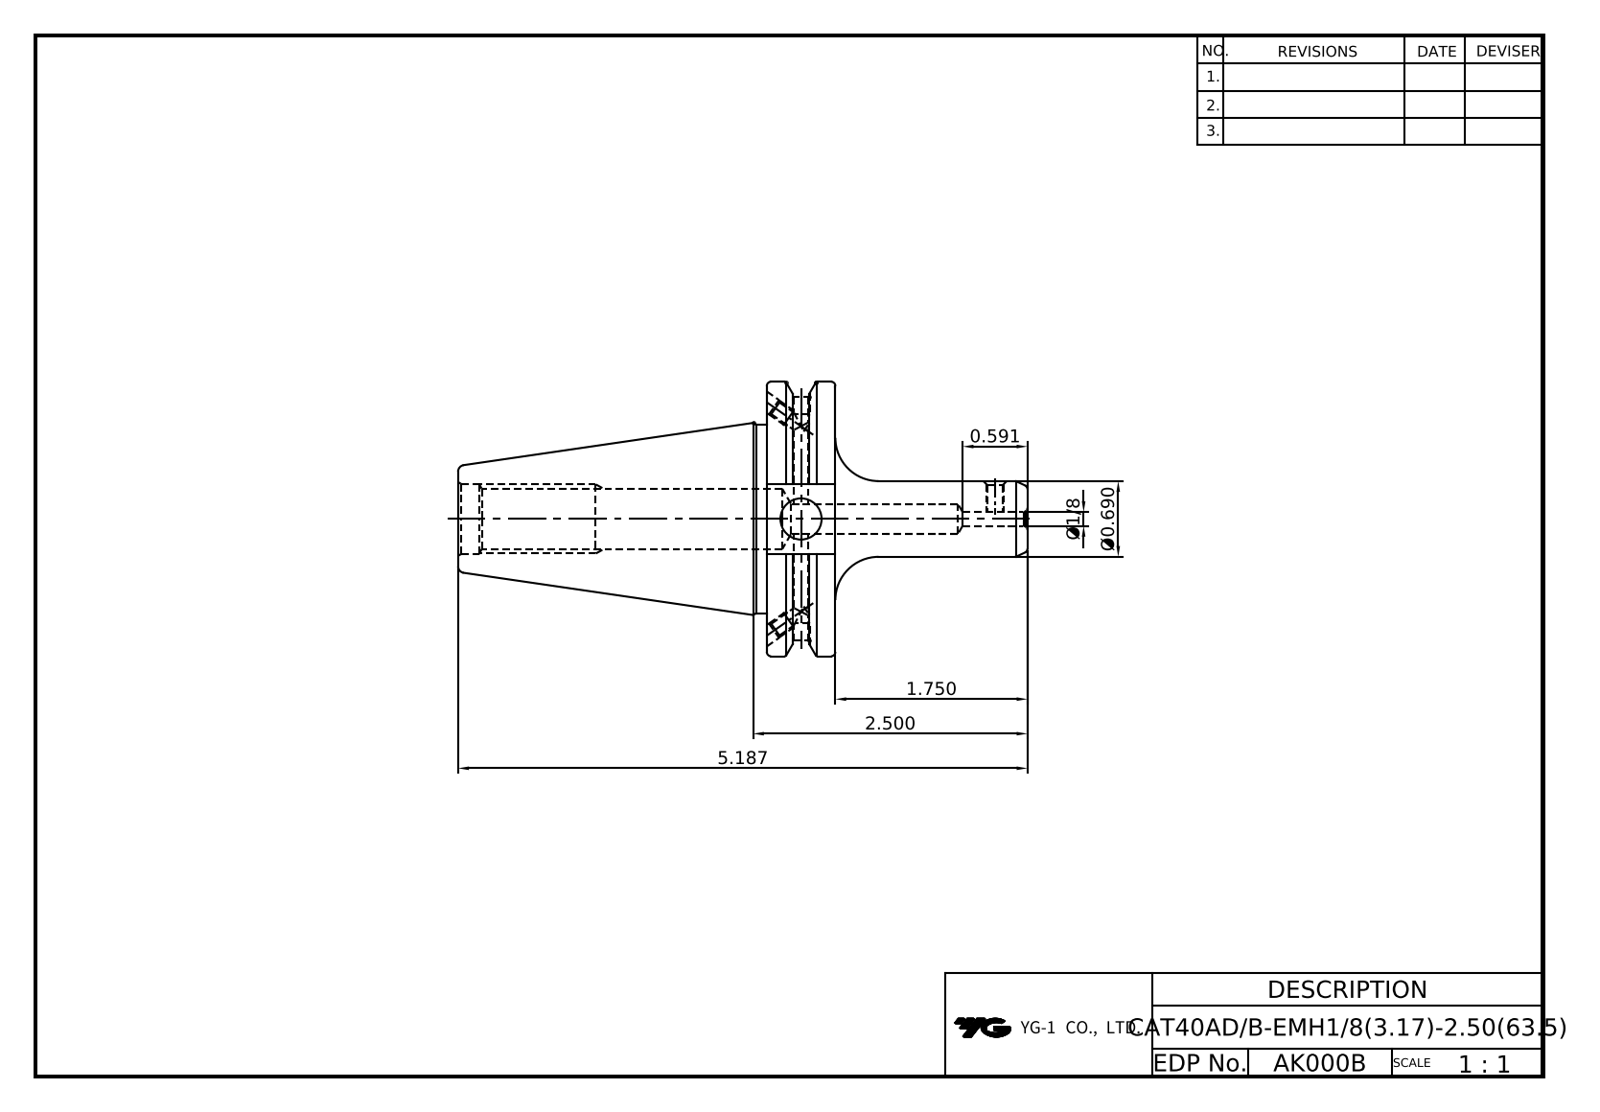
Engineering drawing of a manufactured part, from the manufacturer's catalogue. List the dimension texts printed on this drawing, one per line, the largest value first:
5.187
2.500
1.750
Ø0.690
0.591
Ø1/8
